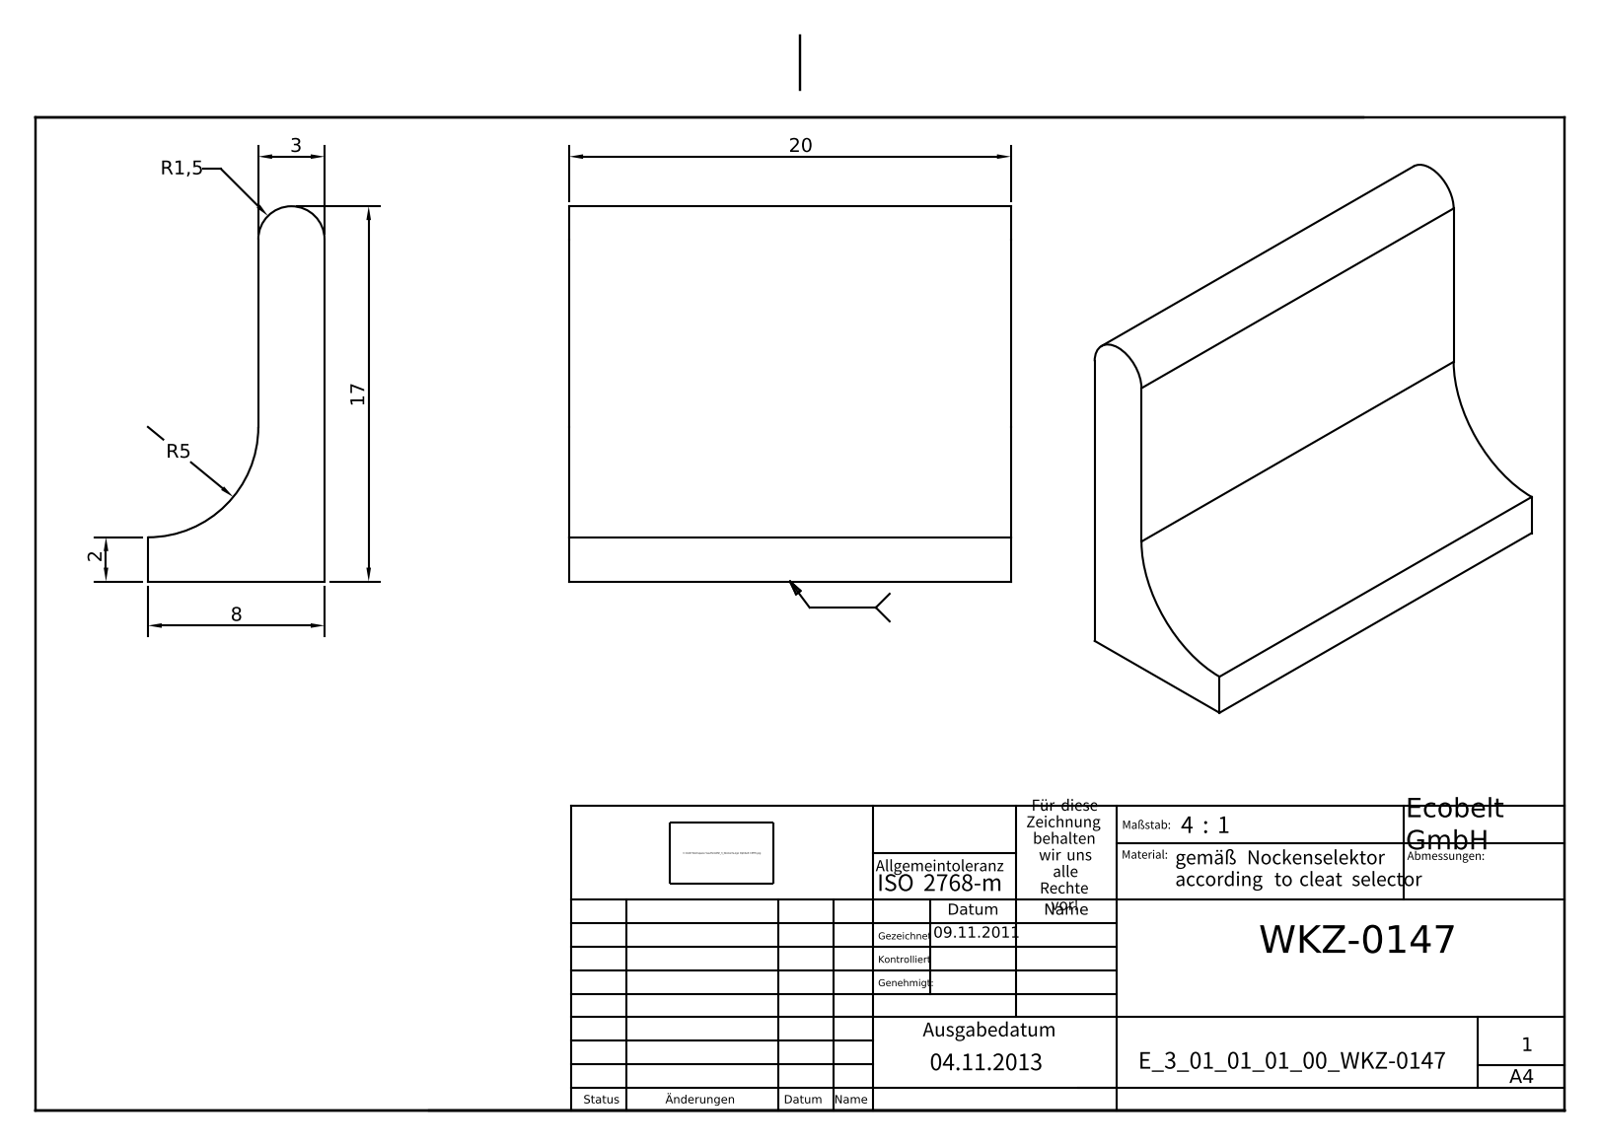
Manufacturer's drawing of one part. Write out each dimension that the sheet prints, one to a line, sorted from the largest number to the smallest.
20
17
8
R5
3
2
R1,5
